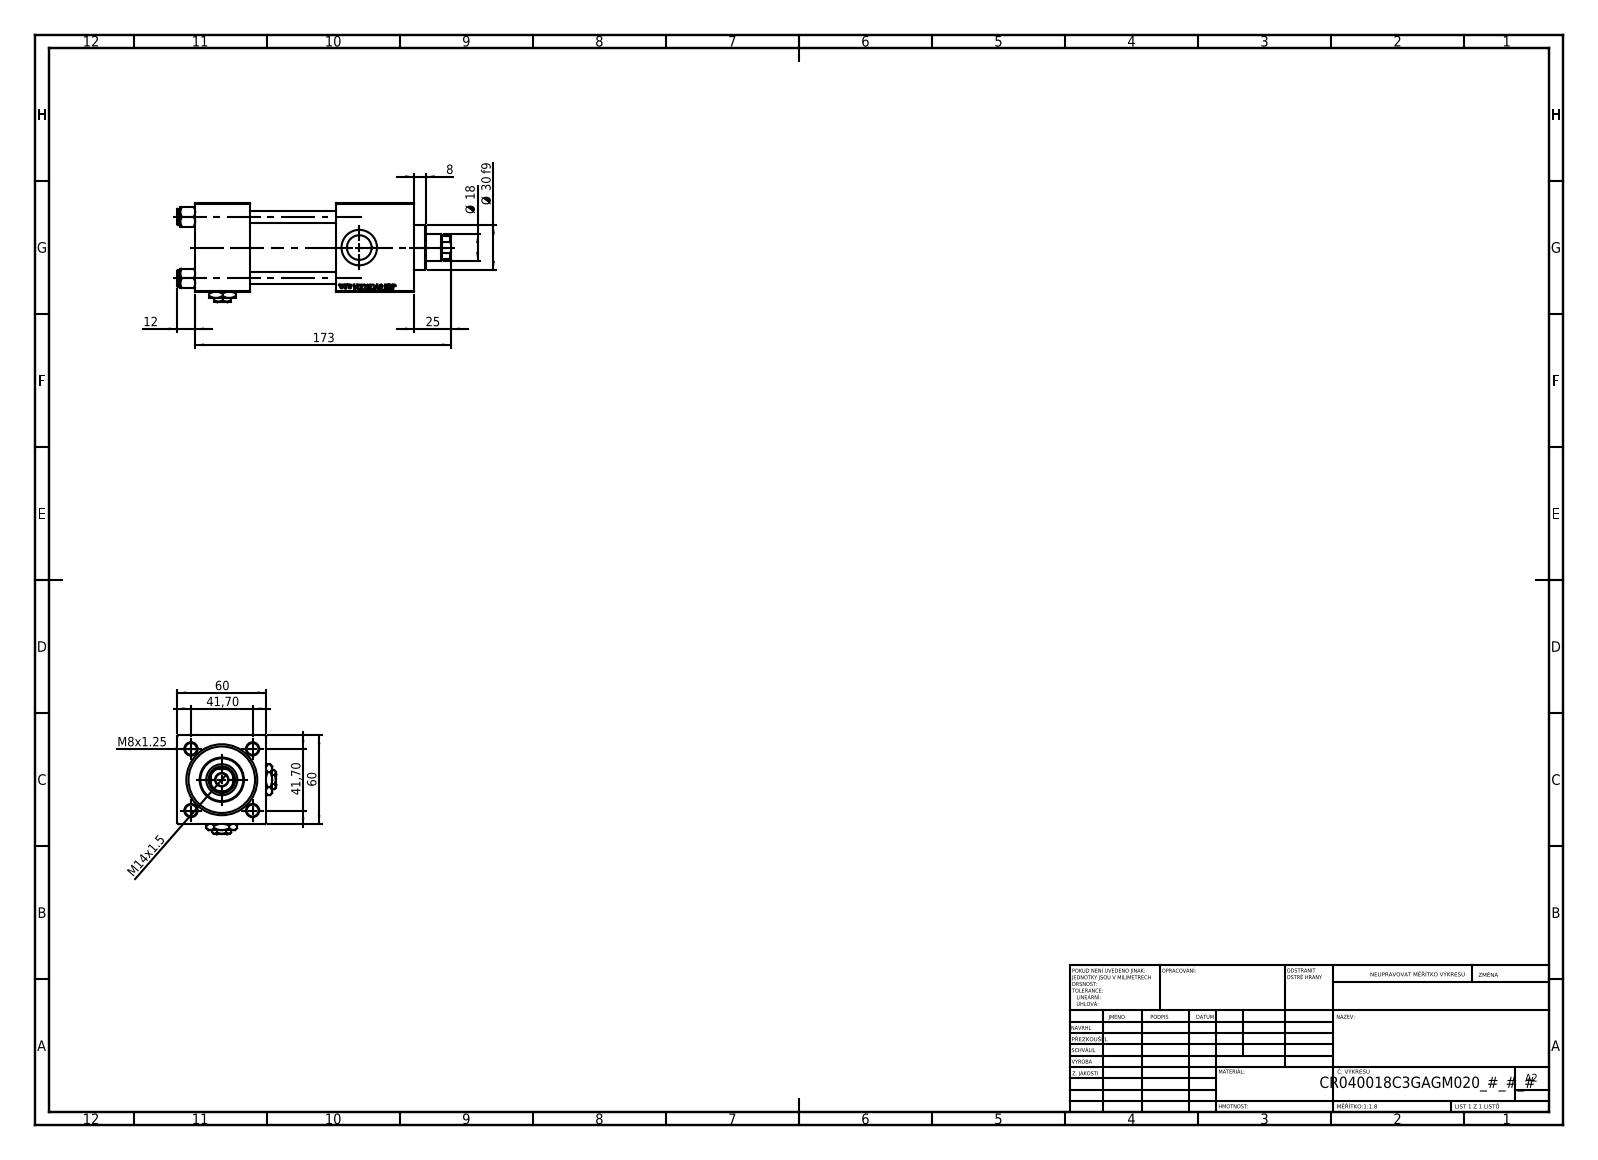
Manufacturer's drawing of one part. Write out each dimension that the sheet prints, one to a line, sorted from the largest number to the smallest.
173
60
60
41,70
41,70
Ø 30 f9
25
Ø 18
M14x1.5
12
8
M8x1.25
